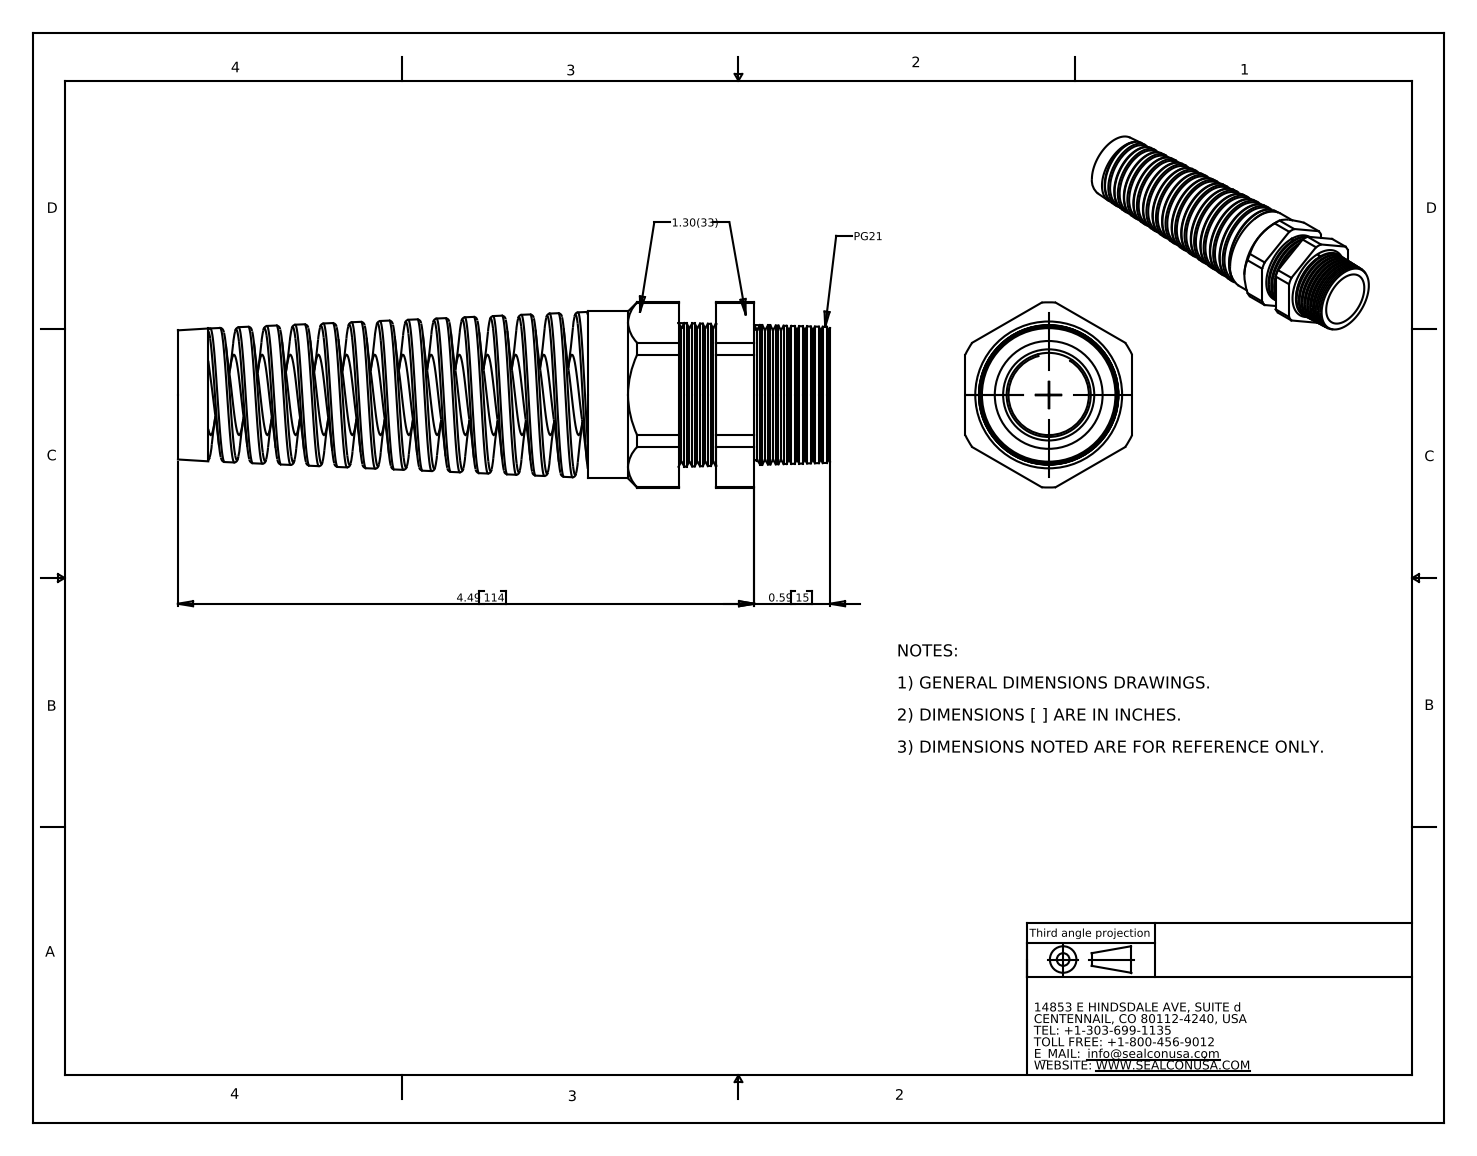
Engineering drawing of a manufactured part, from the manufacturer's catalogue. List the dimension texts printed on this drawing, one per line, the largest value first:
4.49 114
0.59 15
